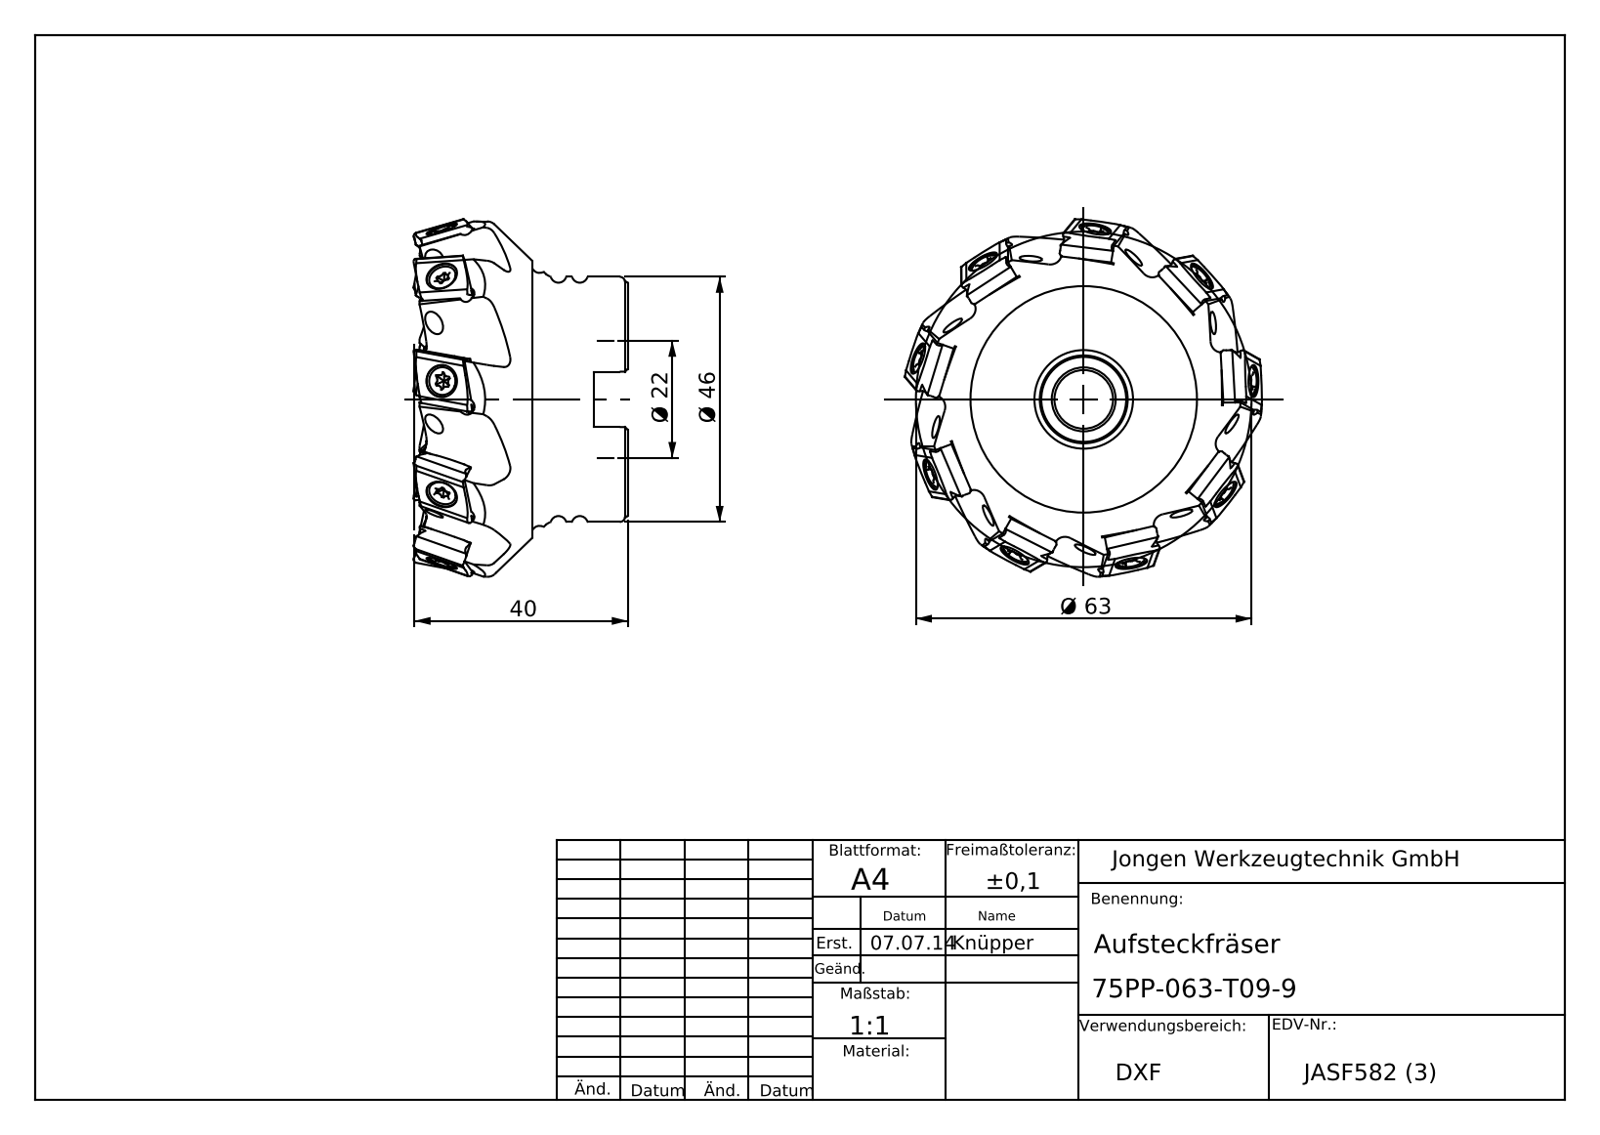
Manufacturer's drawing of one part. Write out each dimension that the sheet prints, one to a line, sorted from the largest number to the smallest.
Ø 63
Ø 46
40
Ø 22
